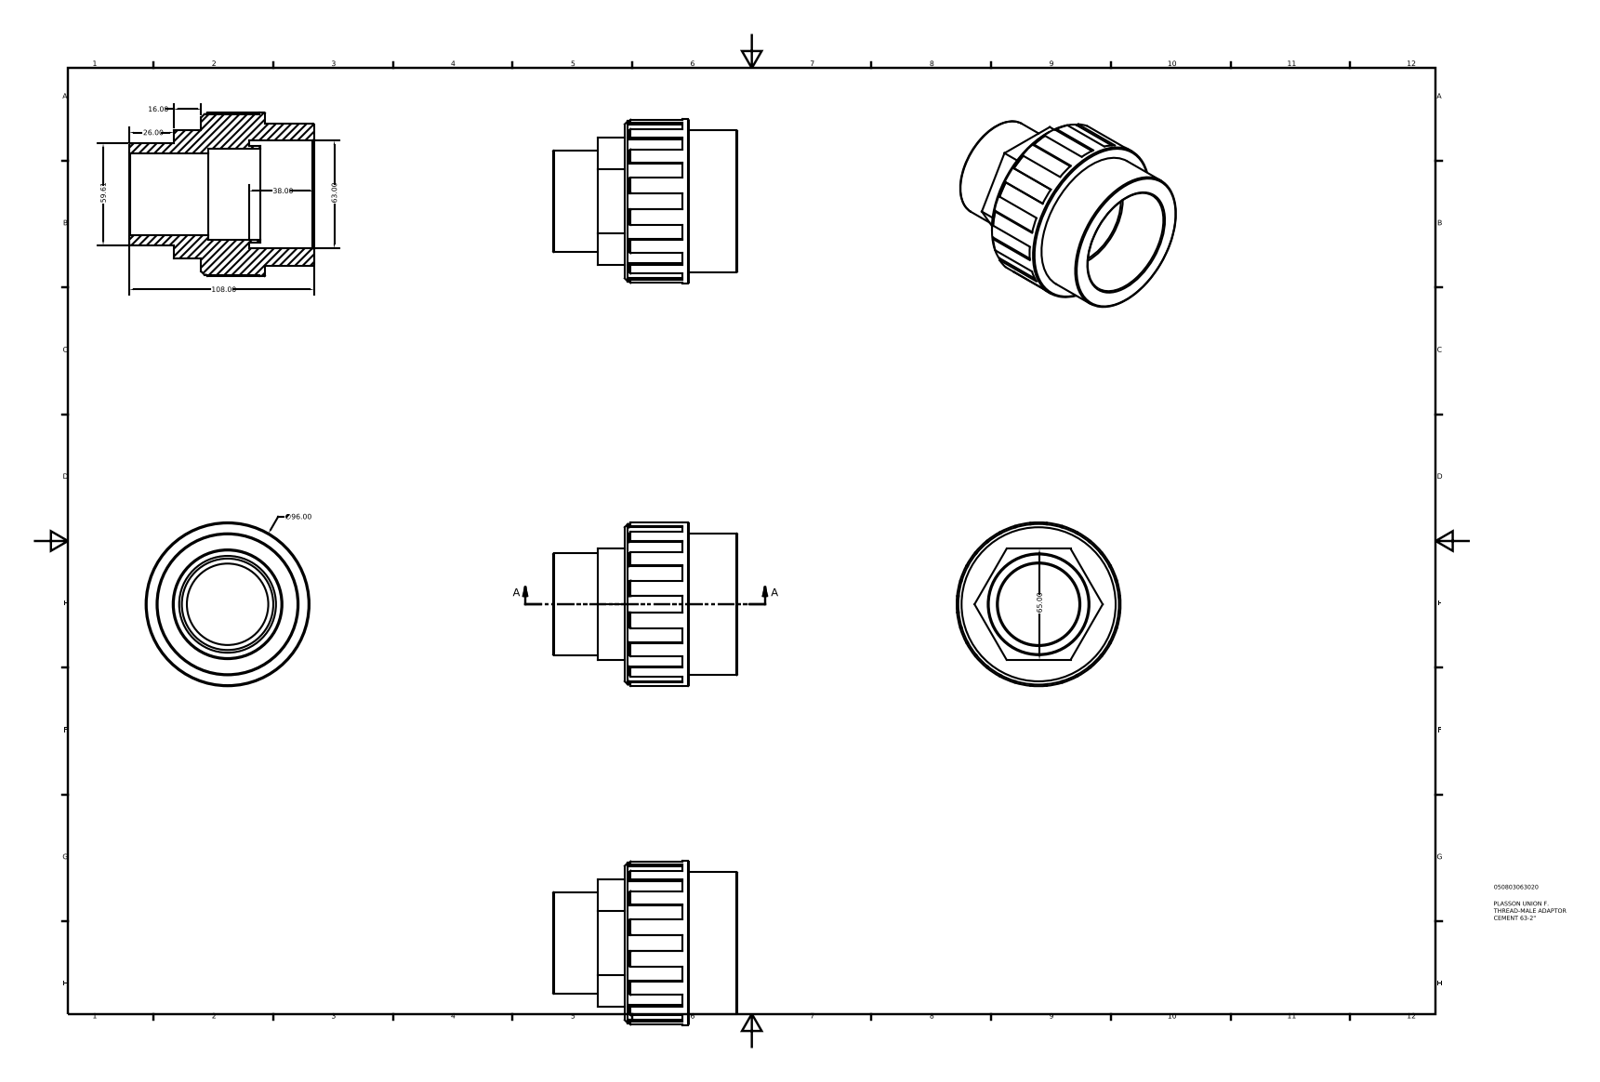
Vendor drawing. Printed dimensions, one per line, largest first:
108.00
∅96.00
65.00
63.00
59.61
38.00
26.00
16.00
